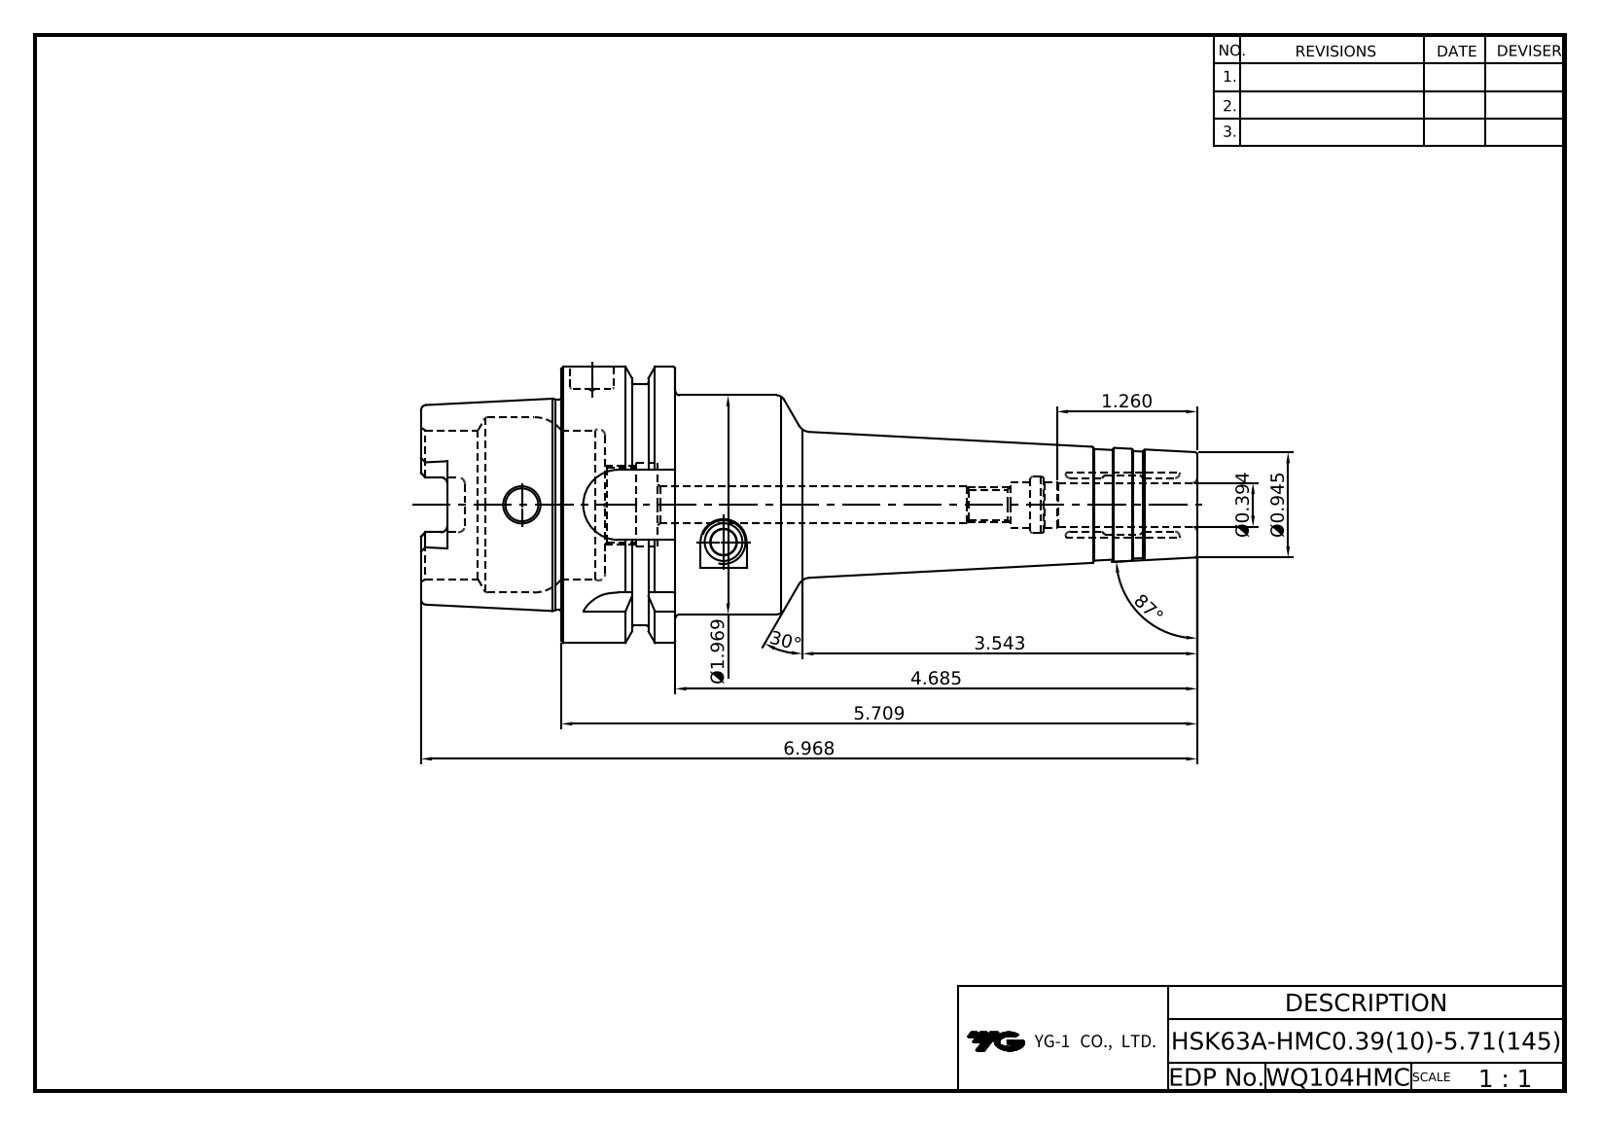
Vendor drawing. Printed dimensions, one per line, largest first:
87°
30°
6.968
5.709
4.685
3.543
Ø1.969
1.260
Ø0.945
Ø0.394
